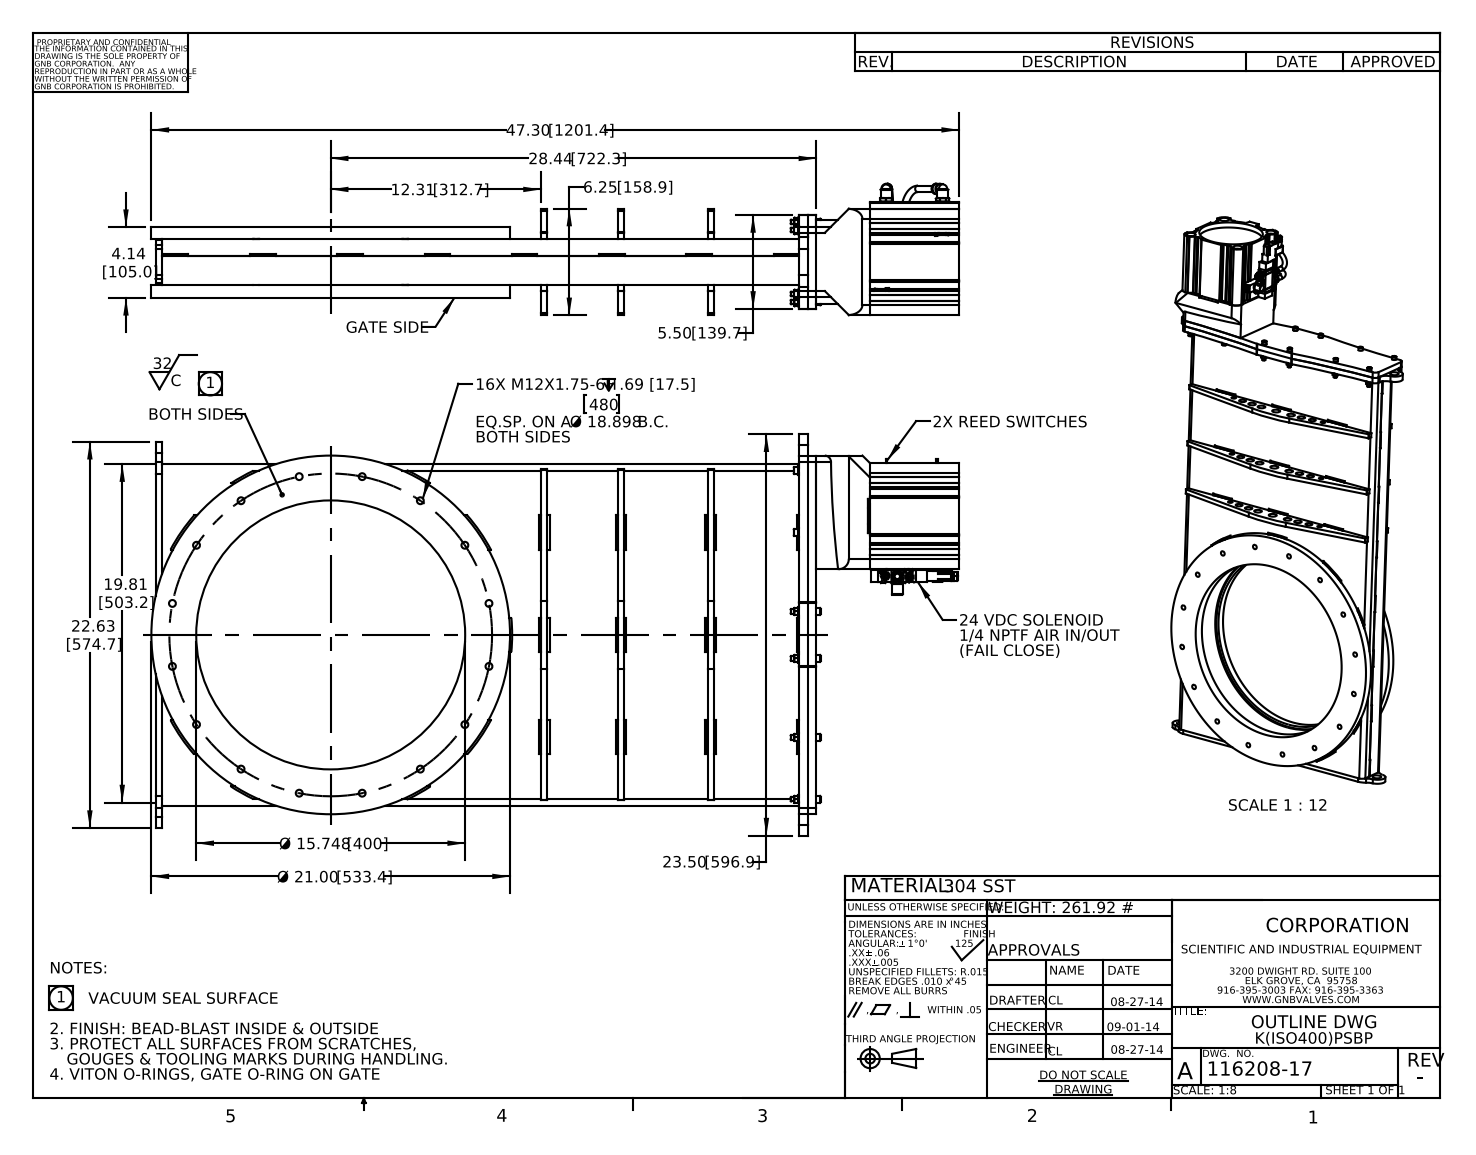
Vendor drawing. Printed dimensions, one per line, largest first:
47.30 [1201.4]
28.44 [722.3]
23.50 [596.9]
22.63 [574.7]
Ø 21.00 [533.4]
19.81 [503.2]
Ø 15.748 [400]
12.31 [312.7]
6.25 [158.9]
5.50 [139.7]
4.14 [105.0]
